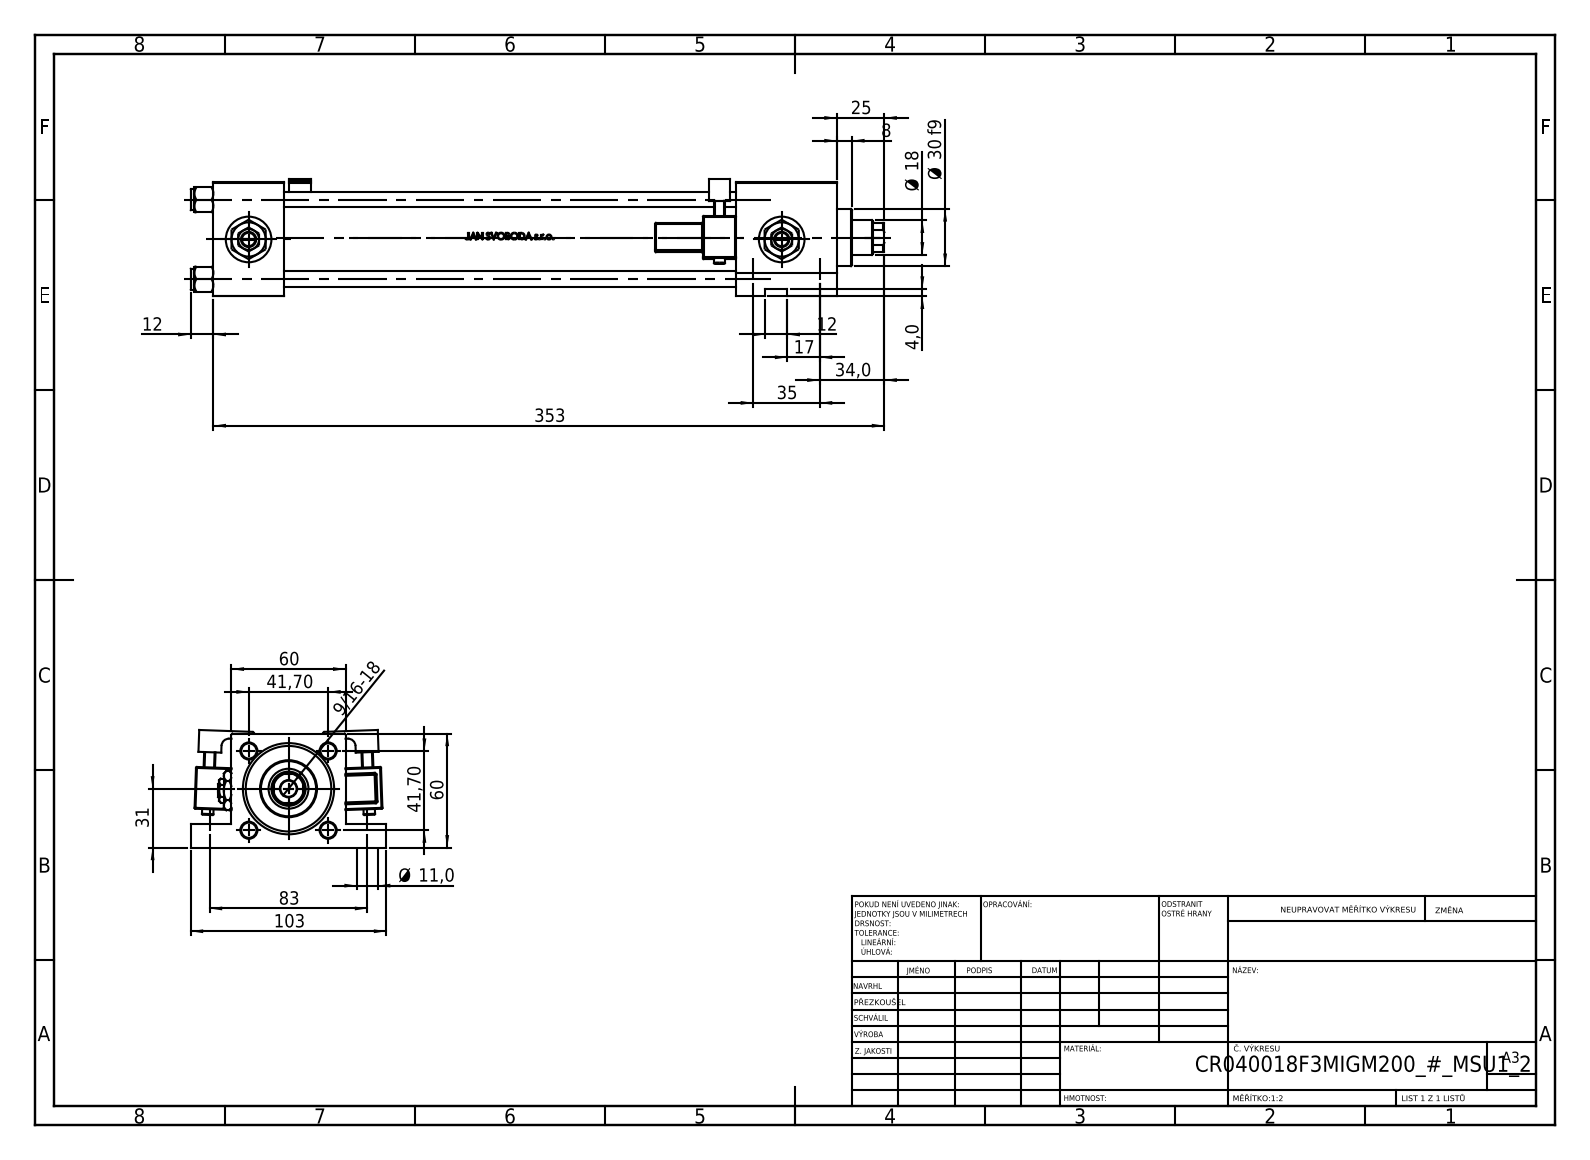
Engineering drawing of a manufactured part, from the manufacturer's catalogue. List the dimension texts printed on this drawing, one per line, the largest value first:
353
103
83
60
60
41,70
41,70
35
34,0
31
Ø 30 f9
25
Ø 18
17
12
12
Ø 11,0
8
4,0
9/16-18
